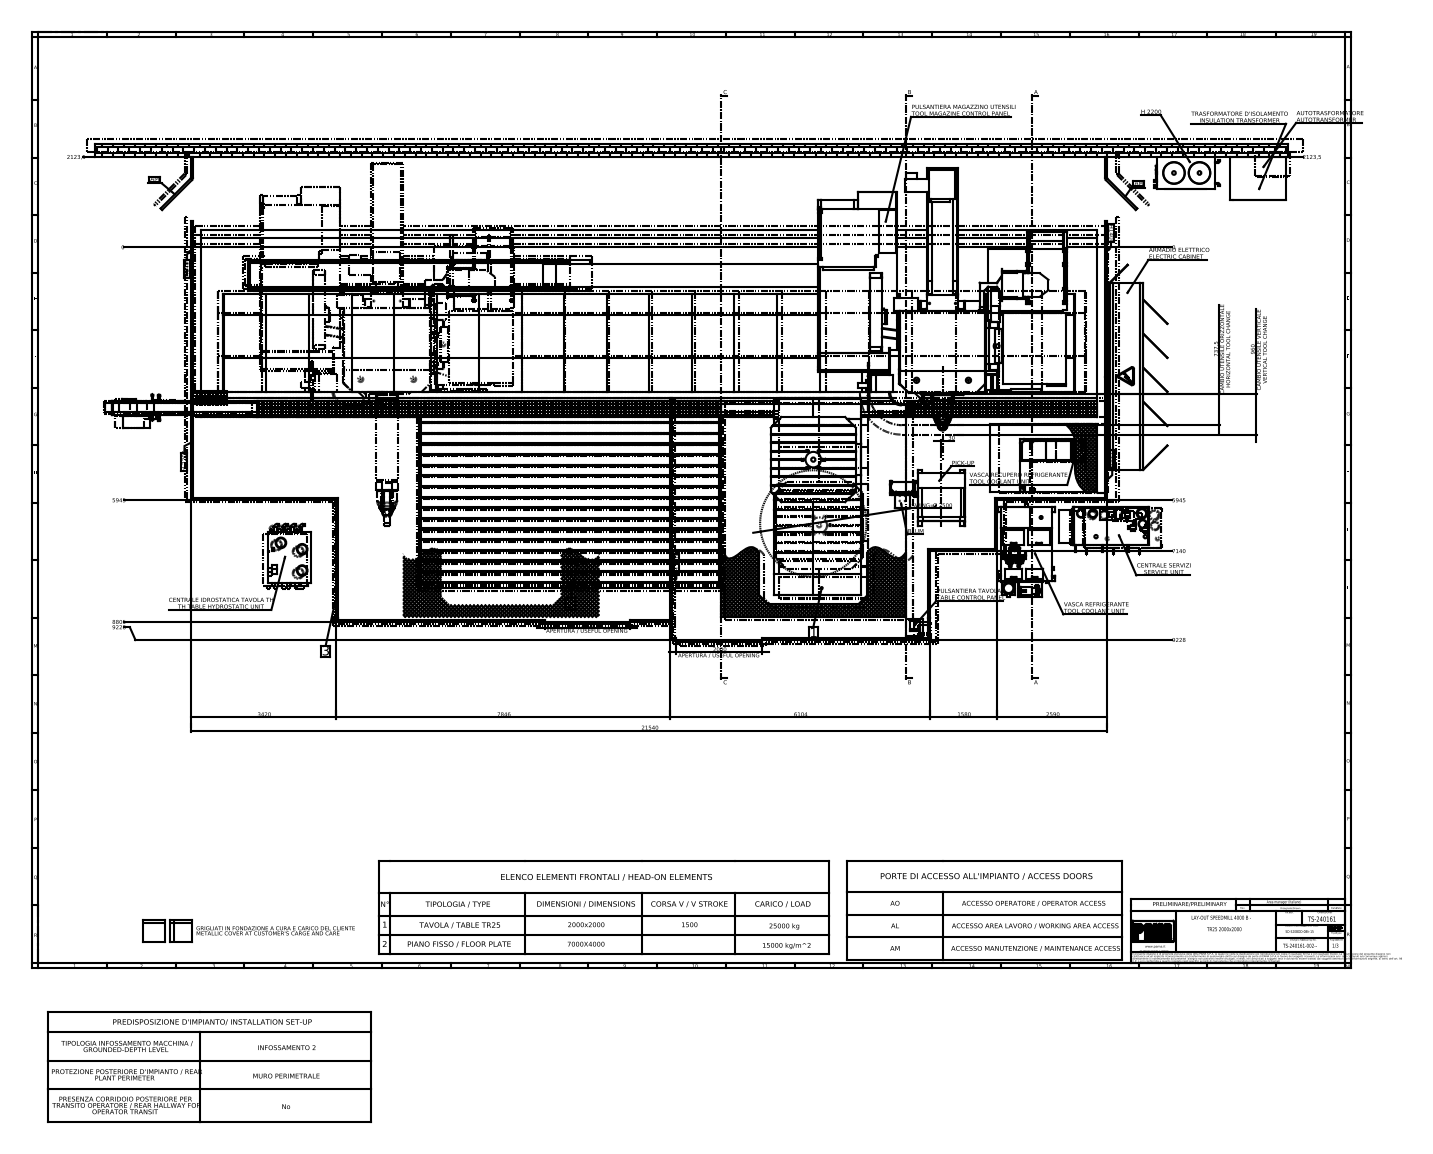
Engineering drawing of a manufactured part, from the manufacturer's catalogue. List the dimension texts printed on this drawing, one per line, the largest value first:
21540
9228
9228
8805
7846
7140
6104
5945
5945
3420
2590
SWING= Ø 2500
2123,5
2123,5
2000 APERTURA / USEFUL OPENING
2000 APERTURA / USEFUL OPENING
1580
960 CAMBIO UTENSILE VERTICALE VERTICAL TOOL CHANGE
737,5 CAMBIO UTENSILE ORIZZONTALE HORIZONTAL TOOL CHANGE
30
0
0
